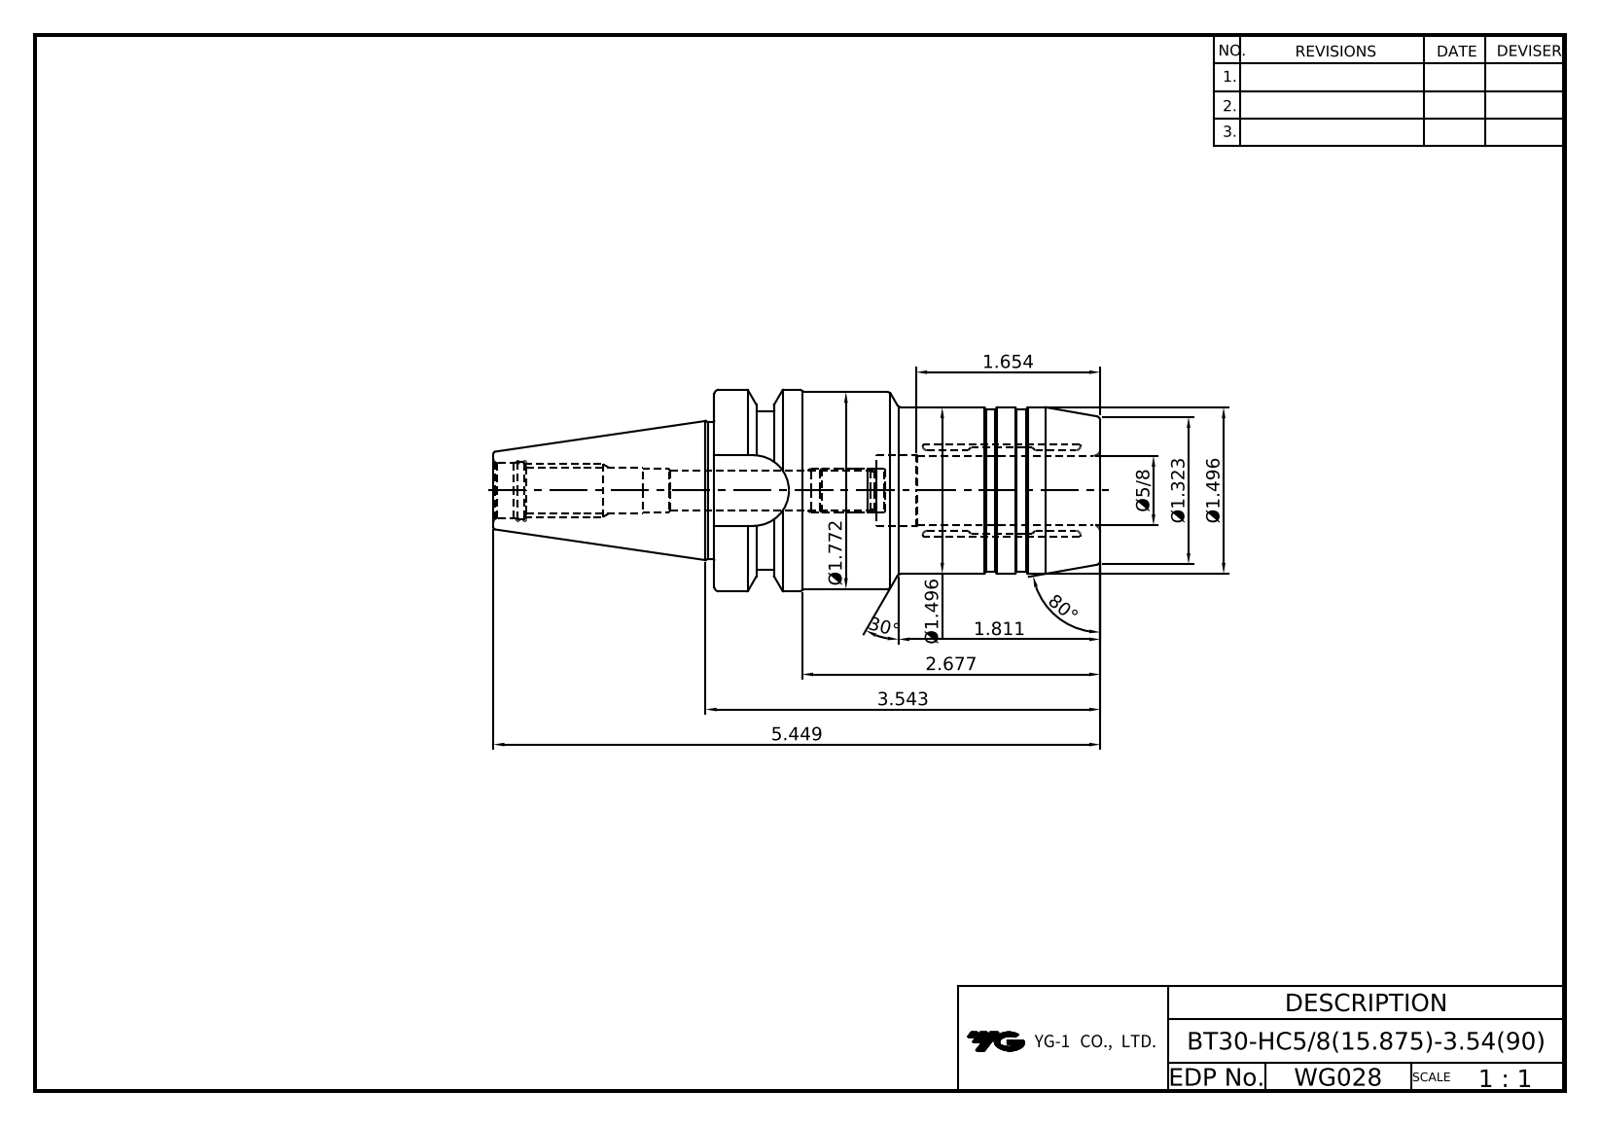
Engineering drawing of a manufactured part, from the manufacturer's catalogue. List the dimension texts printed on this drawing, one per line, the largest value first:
80°
30°
5.449
3.543
2.677
1.811
Ø1.772
1.654
Ø1.496
Ø1.496
Ø1.323
Ø5/8
